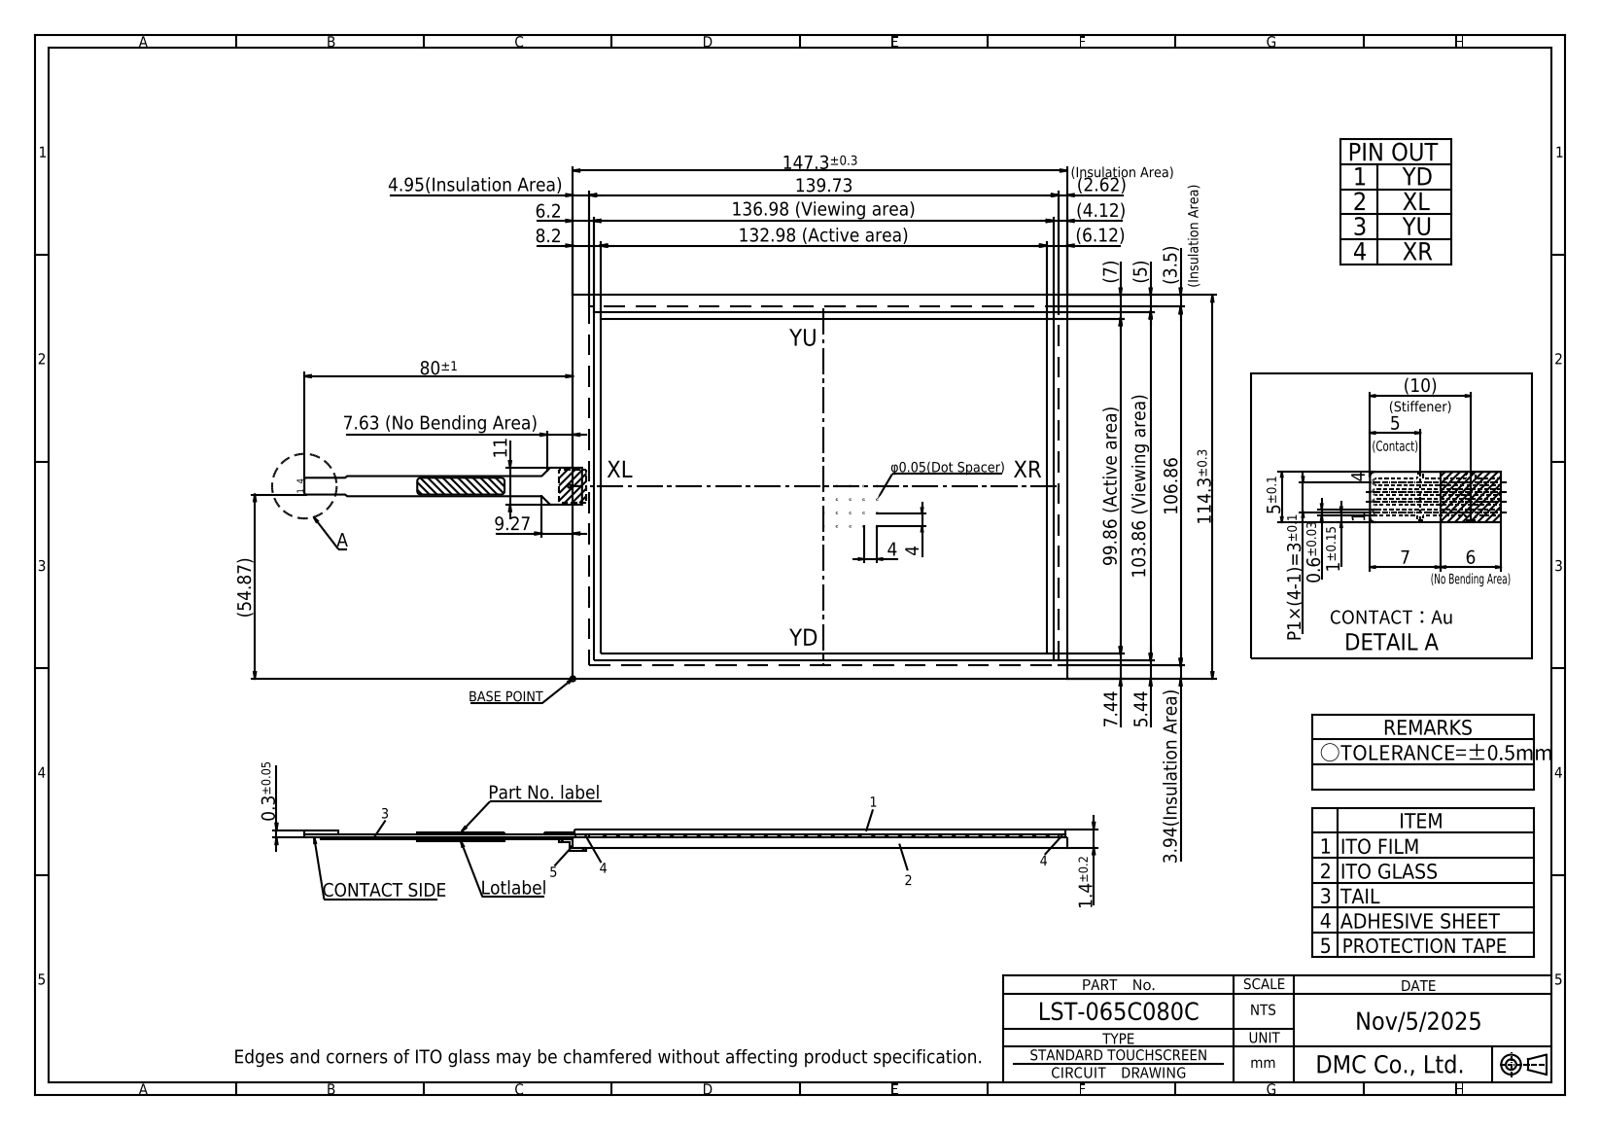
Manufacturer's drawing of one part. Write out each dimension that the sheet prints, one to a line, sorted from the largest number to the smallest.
147.3±0.3
139.73
136.98 (Viewing area)
132.98 (Active area)
114.3±0.3
106.86
103.86 (Viewing area)
99.86 (Active area)
80±1
(54.87)
11
(10)
9.27
8.2
7.63 (No Bending Area)
7.44
(7)
7
6.2
(6.12)
6
5.44
(5)
5
5±0.1
4.95(Insulation Area)
(4.12)
4
4
3.94(Insulation Area)
(3.5)
(2.62)
1.4±0.2
P1×(4-1)=3±0.1
1±0.15
0.6±0.03
0.3±0.05
